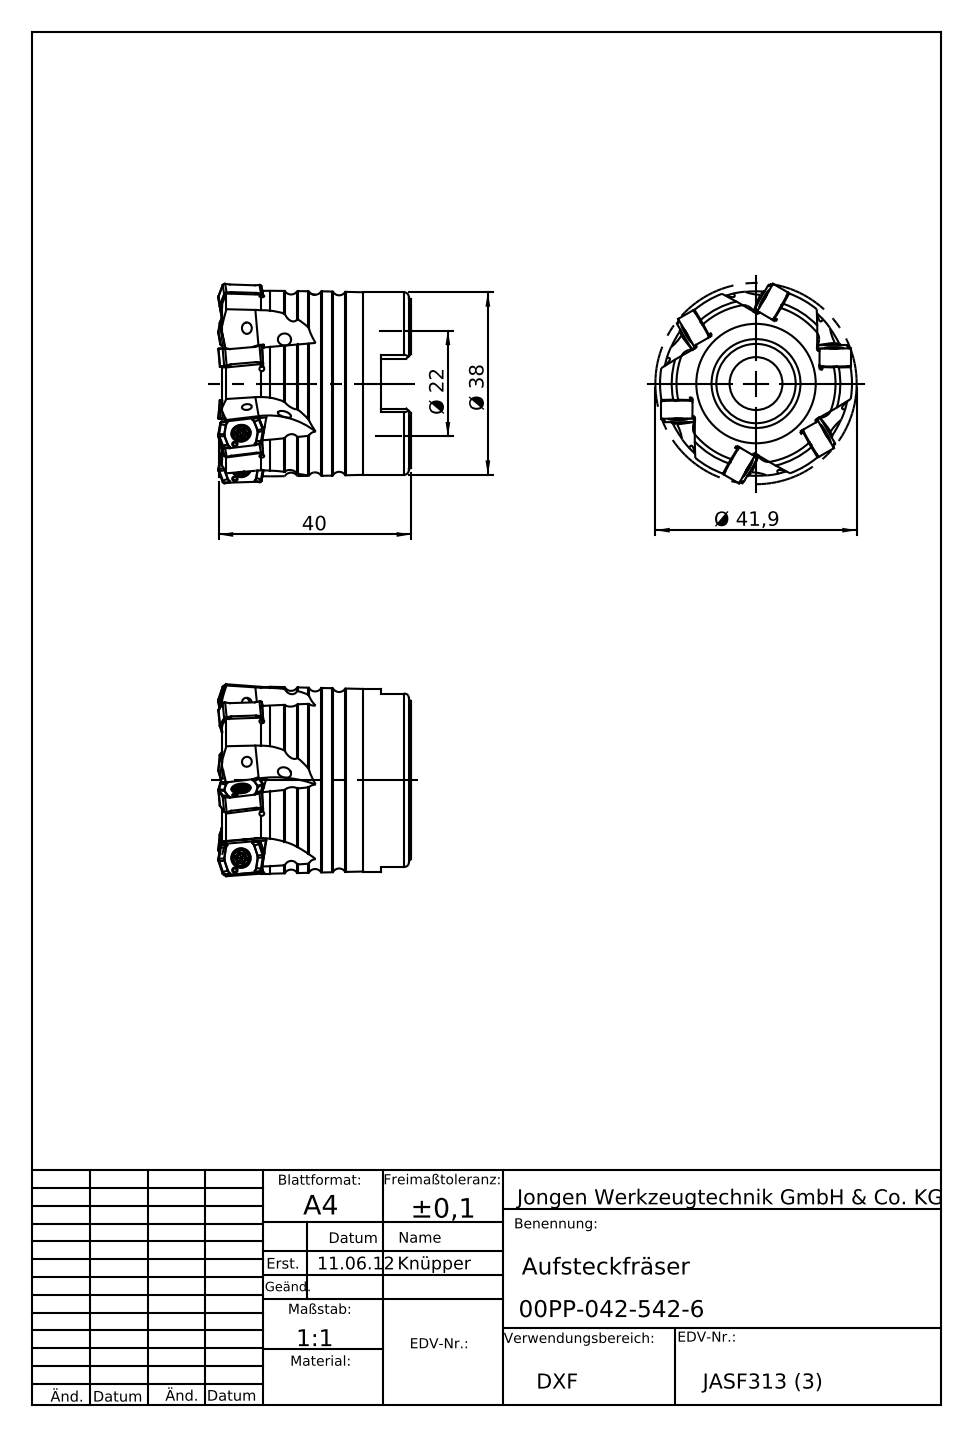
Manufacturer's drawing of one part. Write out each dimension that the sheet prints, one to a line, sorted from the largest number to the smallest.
Ø 41,9
40
Ø 38
Ø 22
